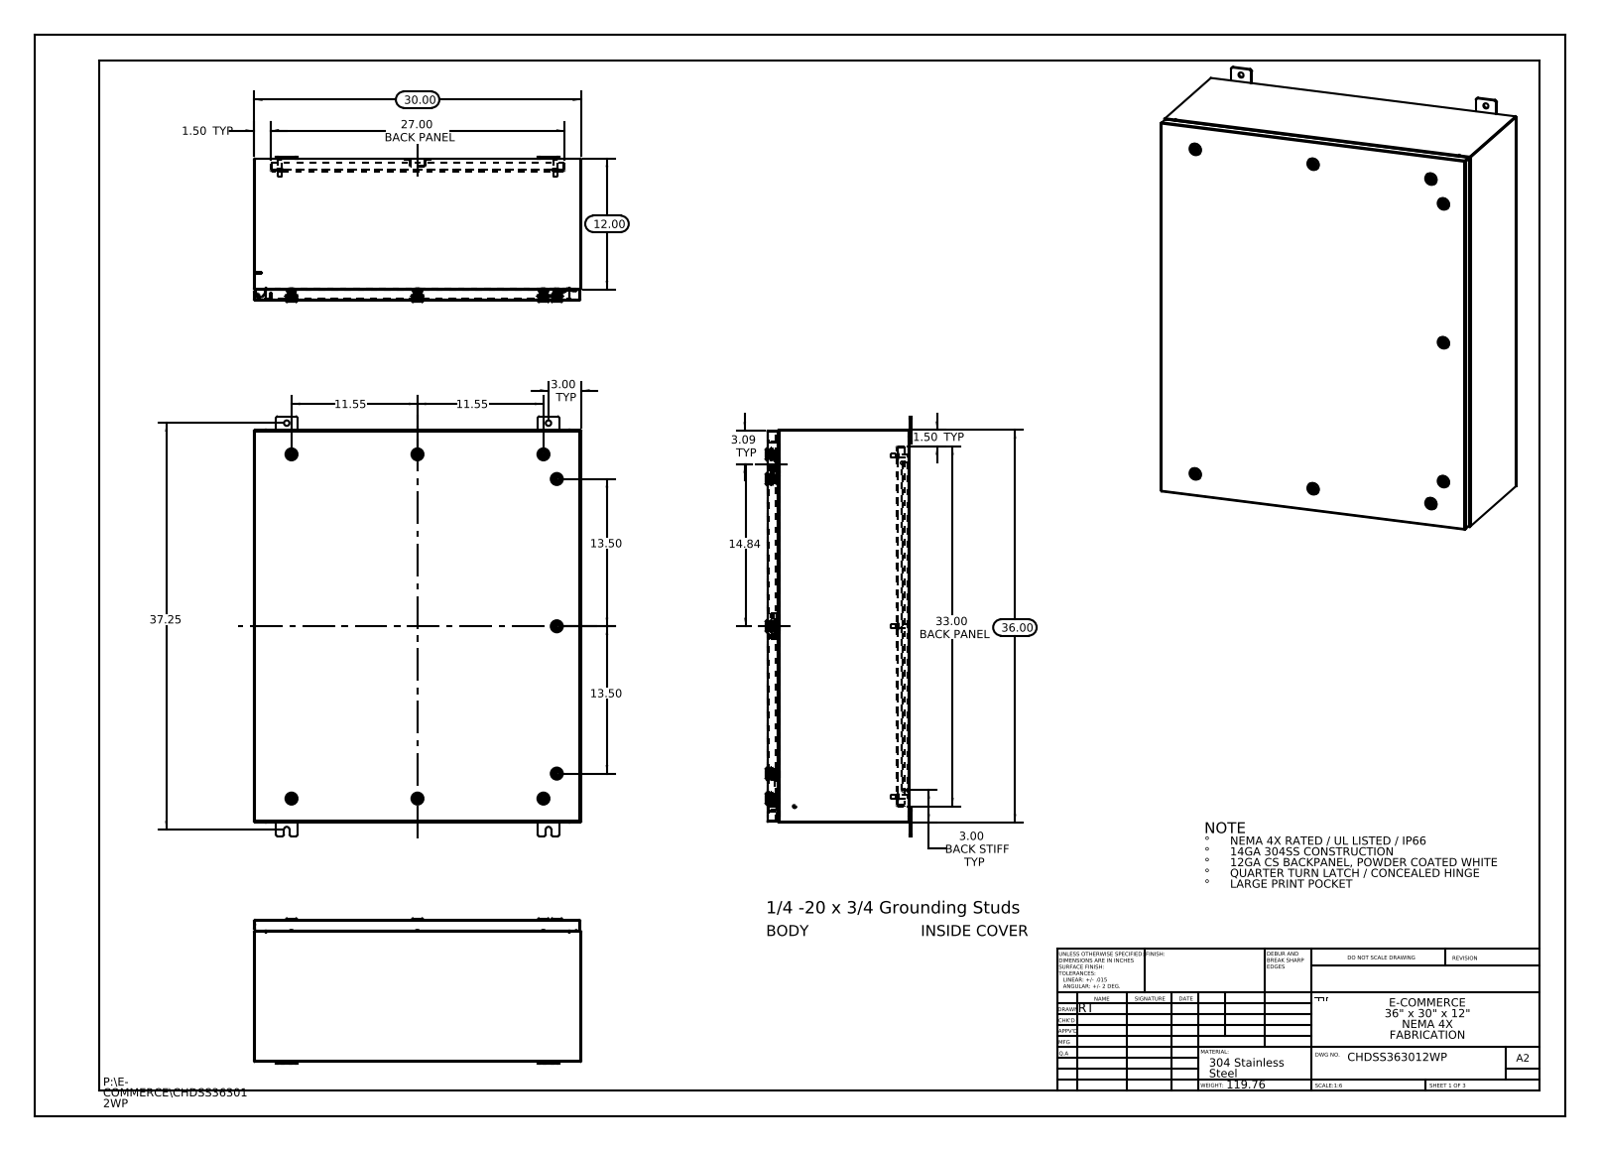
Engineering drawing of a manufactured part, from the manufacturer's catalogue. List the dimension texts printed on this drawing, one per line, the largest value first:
37.25
36.00
33.00 BACK PANEL
30.00
27.00 BACK PANEL
14.84
13.50
13.50
12.00
11.55
11.55
3.09 TYP
3.00 TYP
3.00 BACK STIFF TYP
1.50 TYP
1.50 TYP
